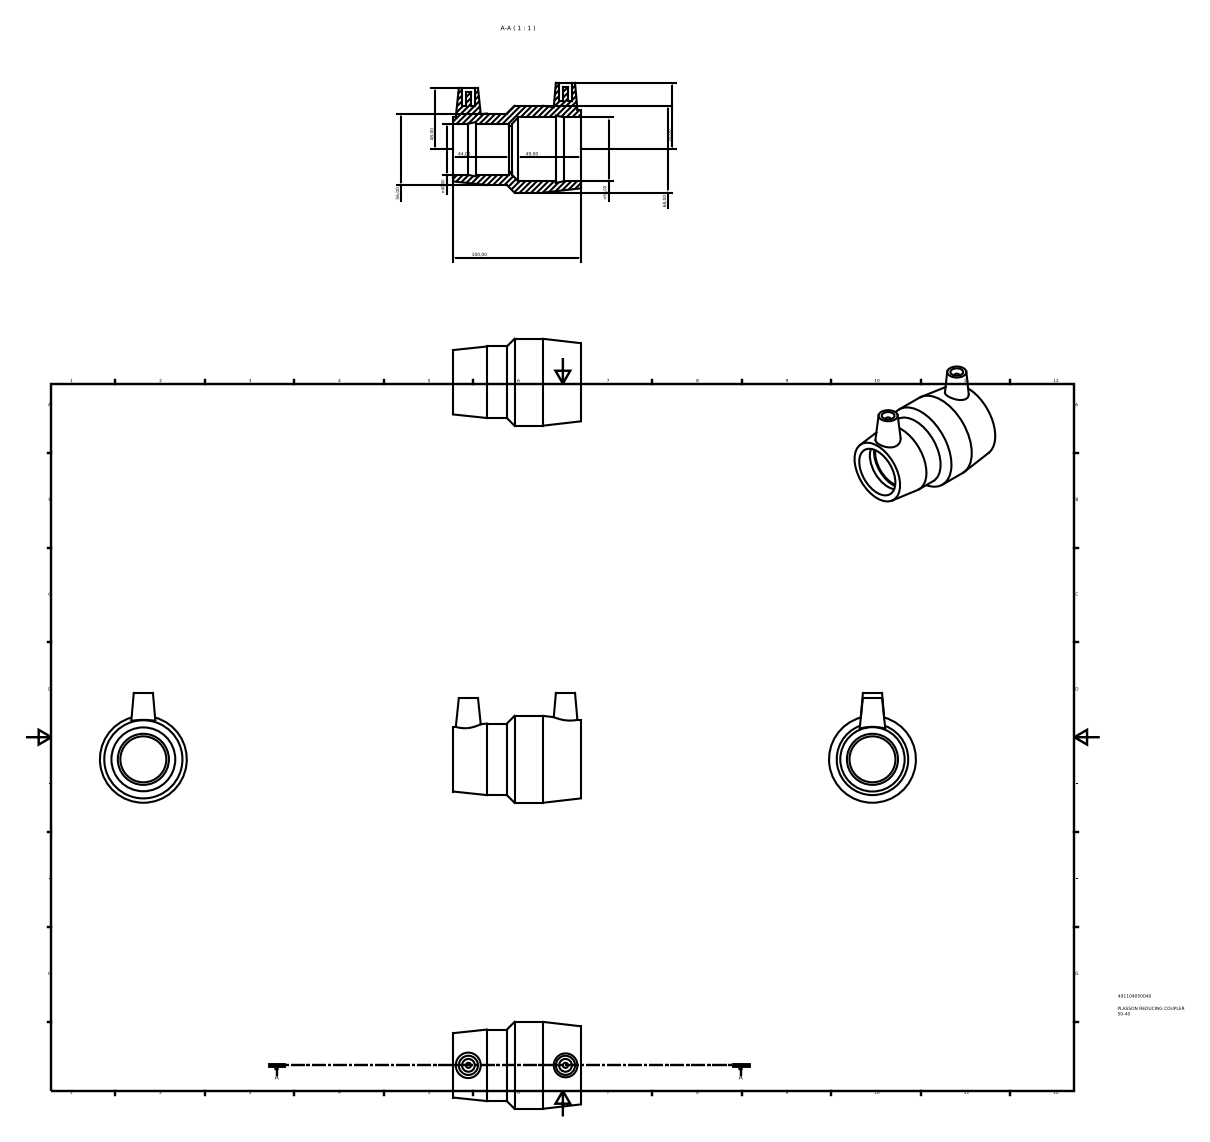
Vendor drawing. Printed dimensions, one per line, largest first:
100,00
68,00
56,00
52,00
n50,00
49,00
48,00
44,00
n40,00
